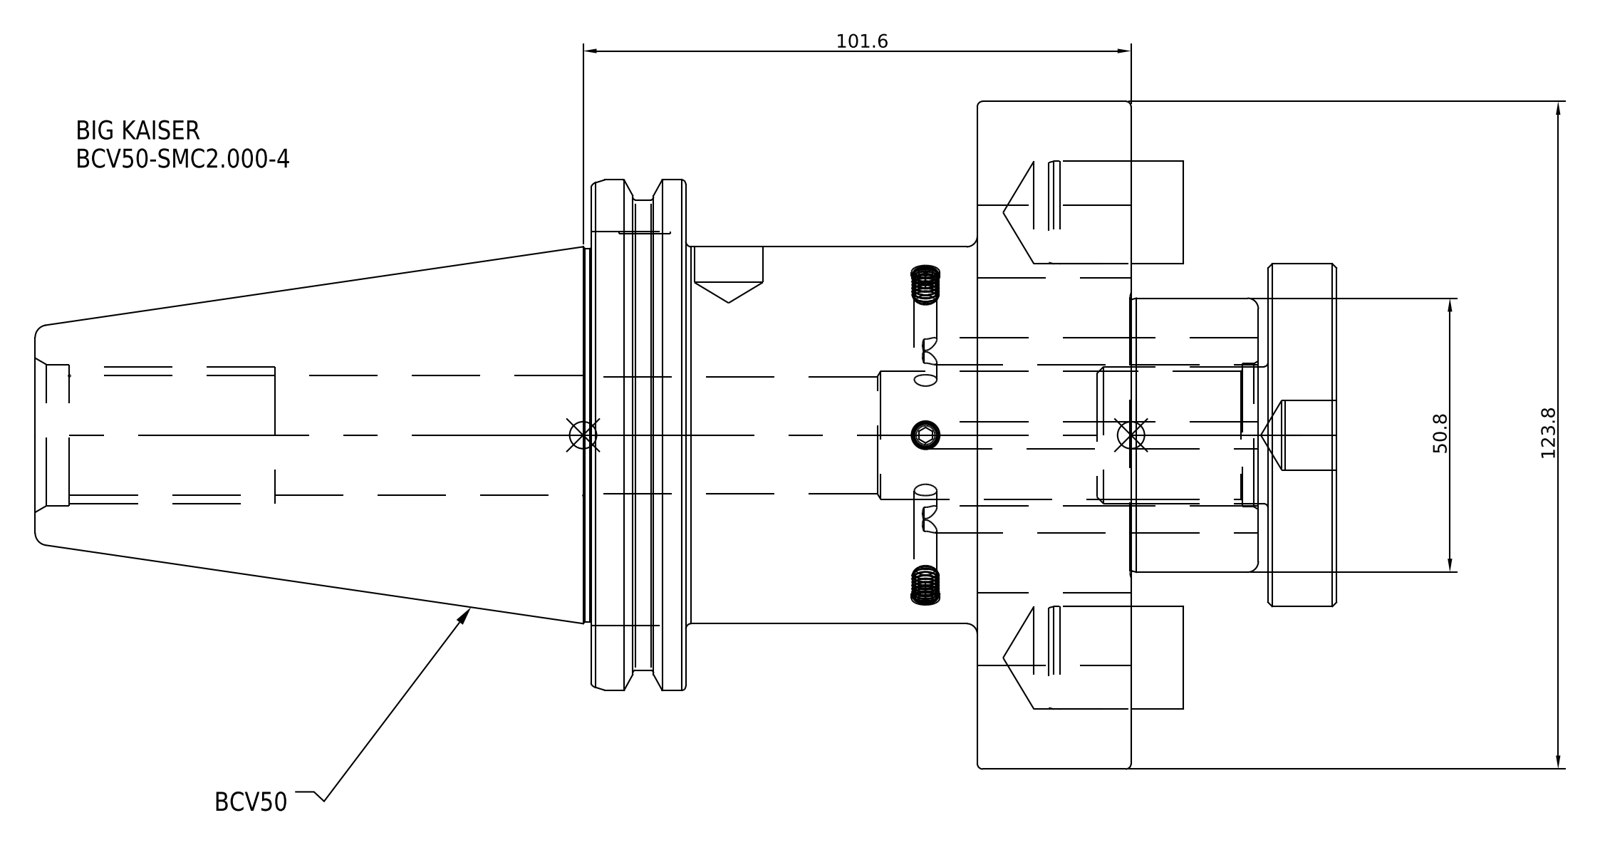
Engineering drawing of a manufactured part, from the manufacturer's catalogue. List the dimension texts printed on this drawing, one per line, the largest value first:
123.8
101.6
50.8
